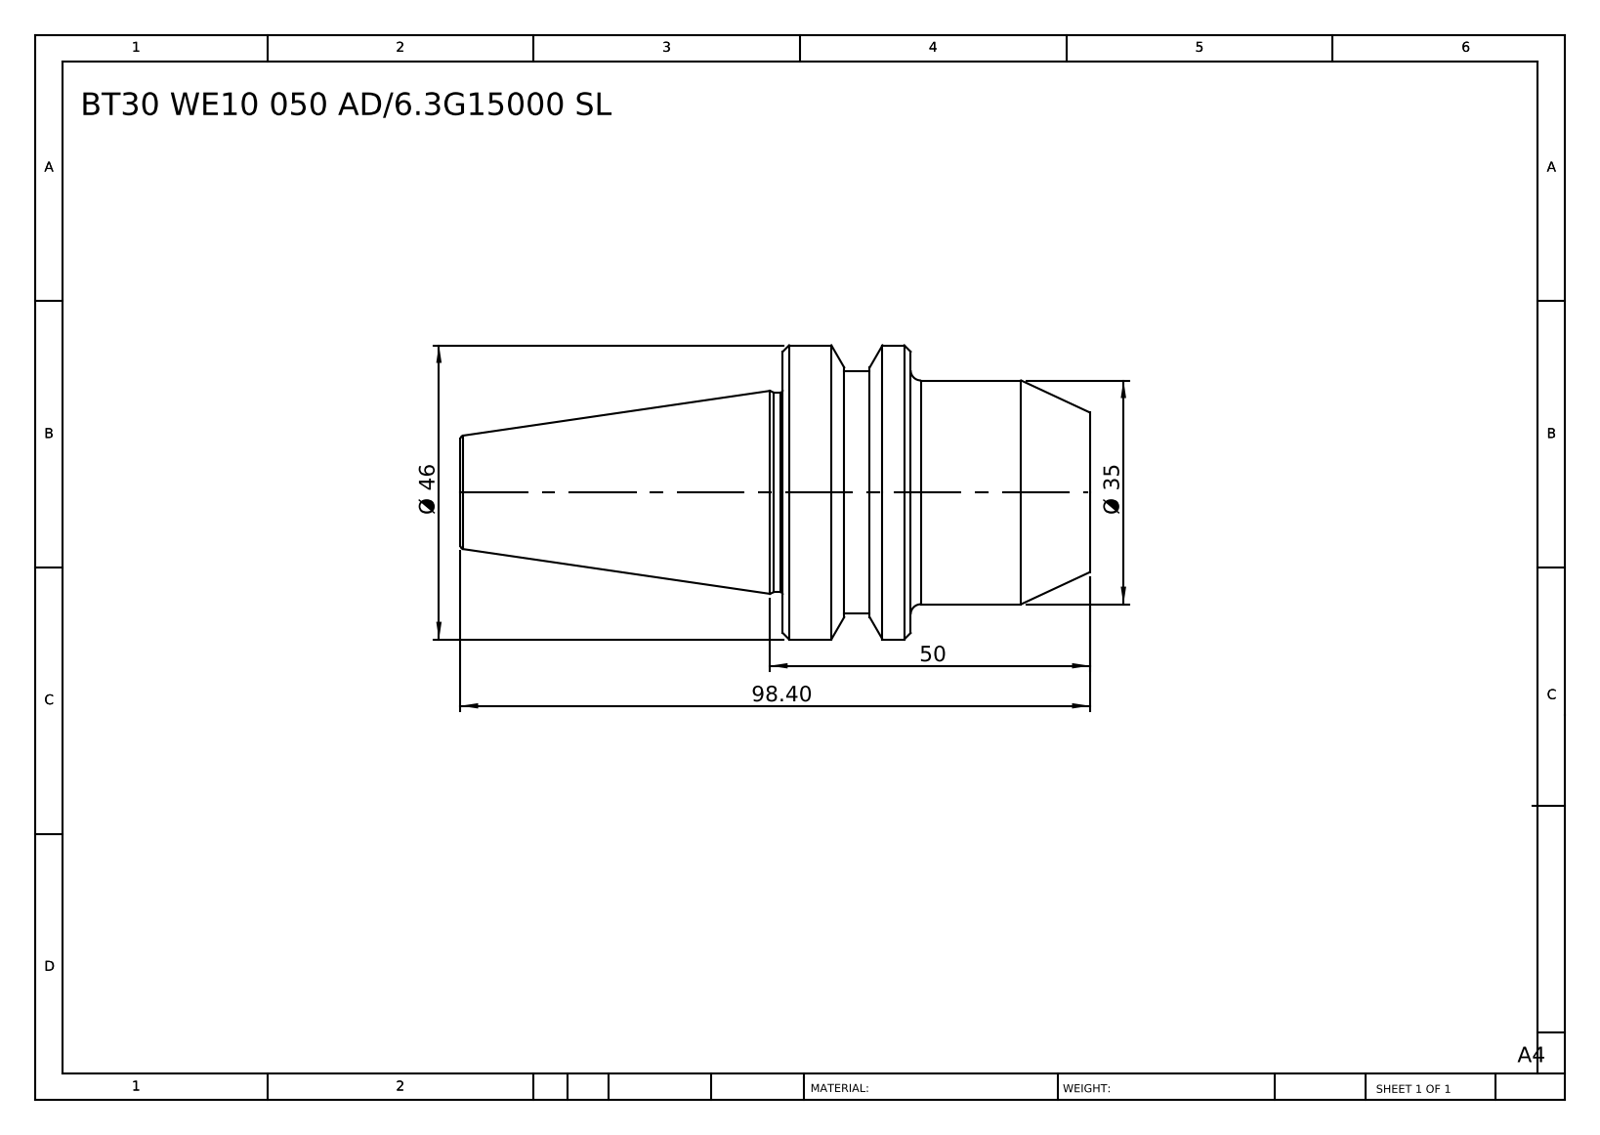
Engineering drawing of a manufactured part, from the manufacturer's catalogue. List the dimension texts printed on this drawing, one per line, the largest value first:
98.40
50
Ø 46
Ø 35
